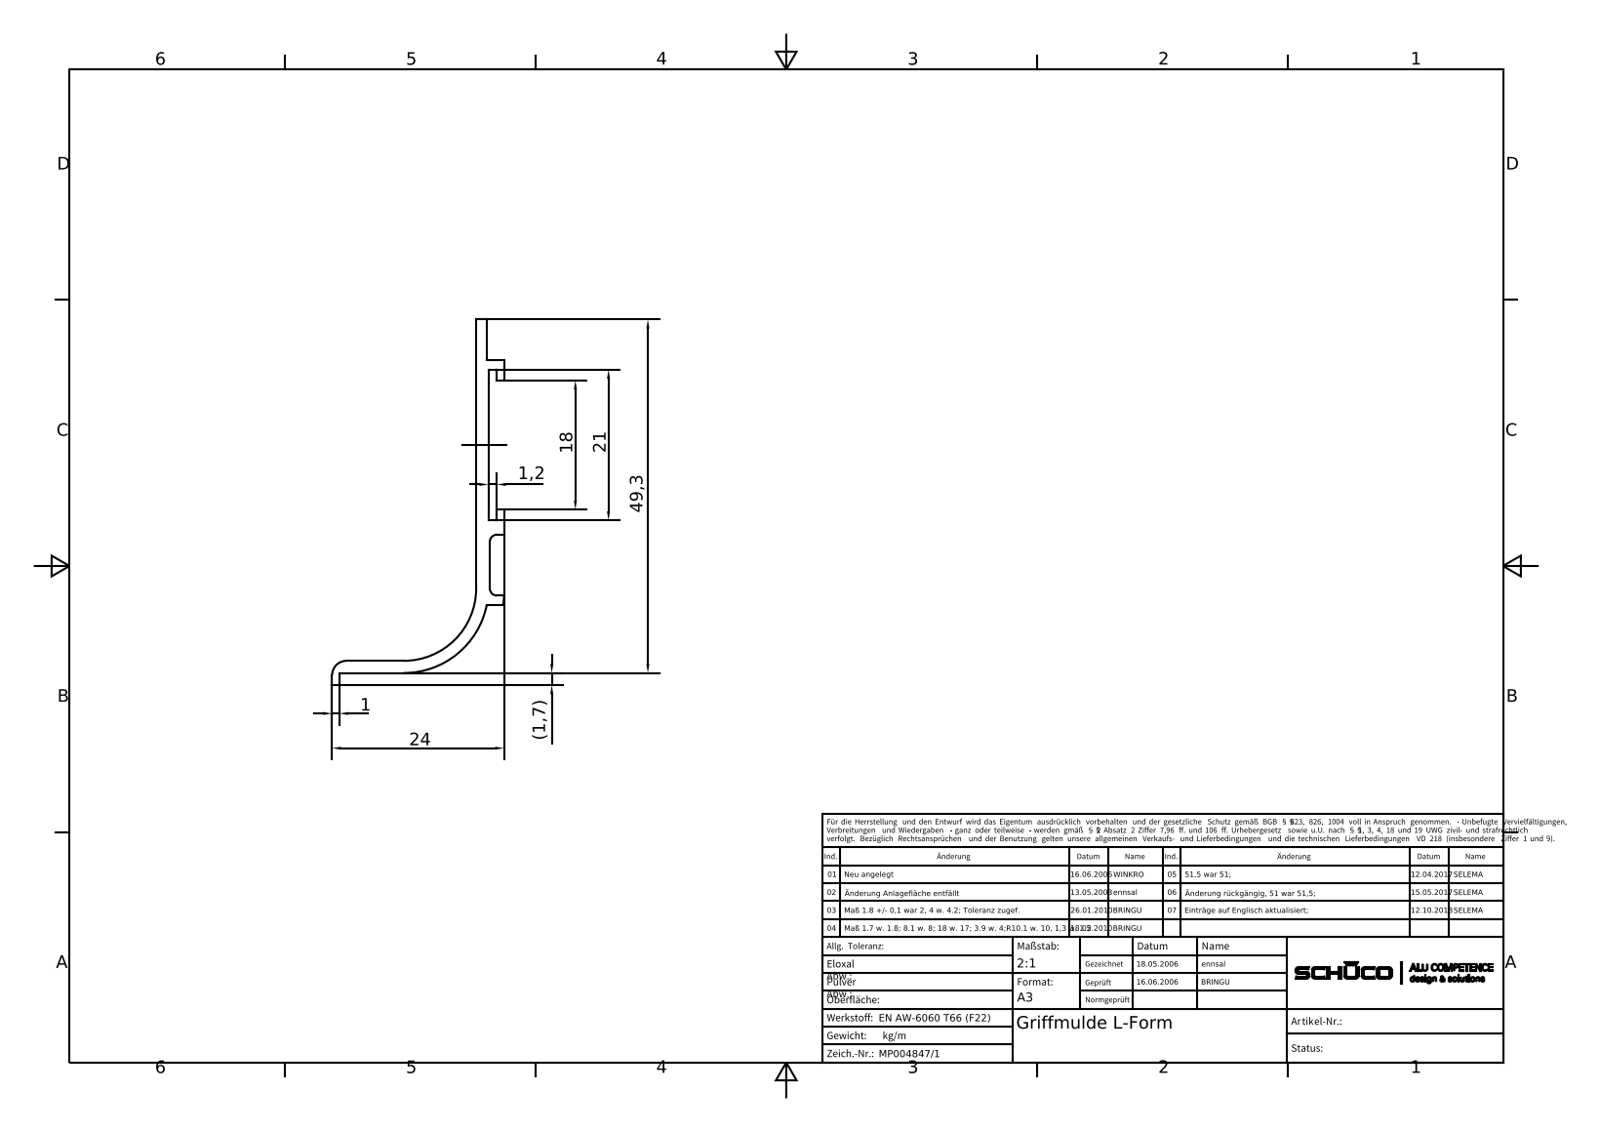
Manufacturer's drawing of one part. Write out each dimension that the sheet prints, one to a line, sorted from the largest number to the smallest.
49,3
24
21
18
(1,7)
1,2
1
